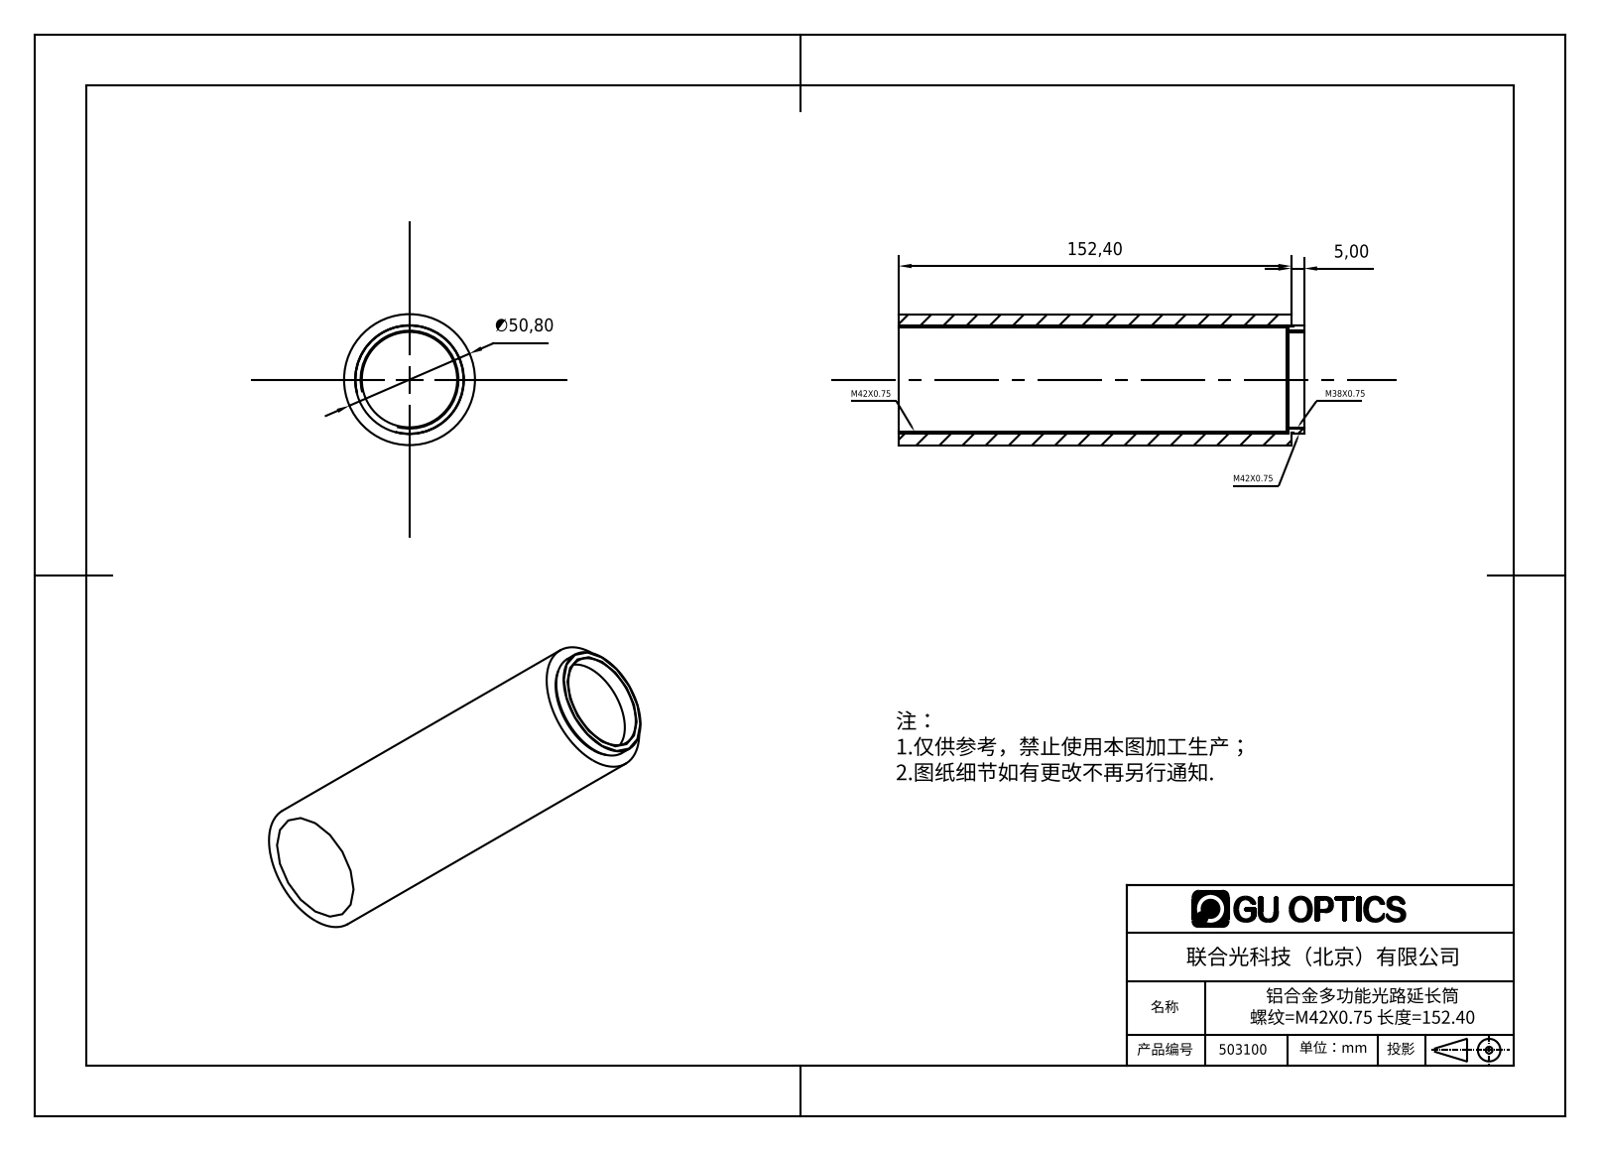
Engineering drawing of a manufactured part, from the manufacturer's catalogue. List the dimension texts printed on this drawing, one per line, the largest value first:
152,40
∅50,80
5,00
